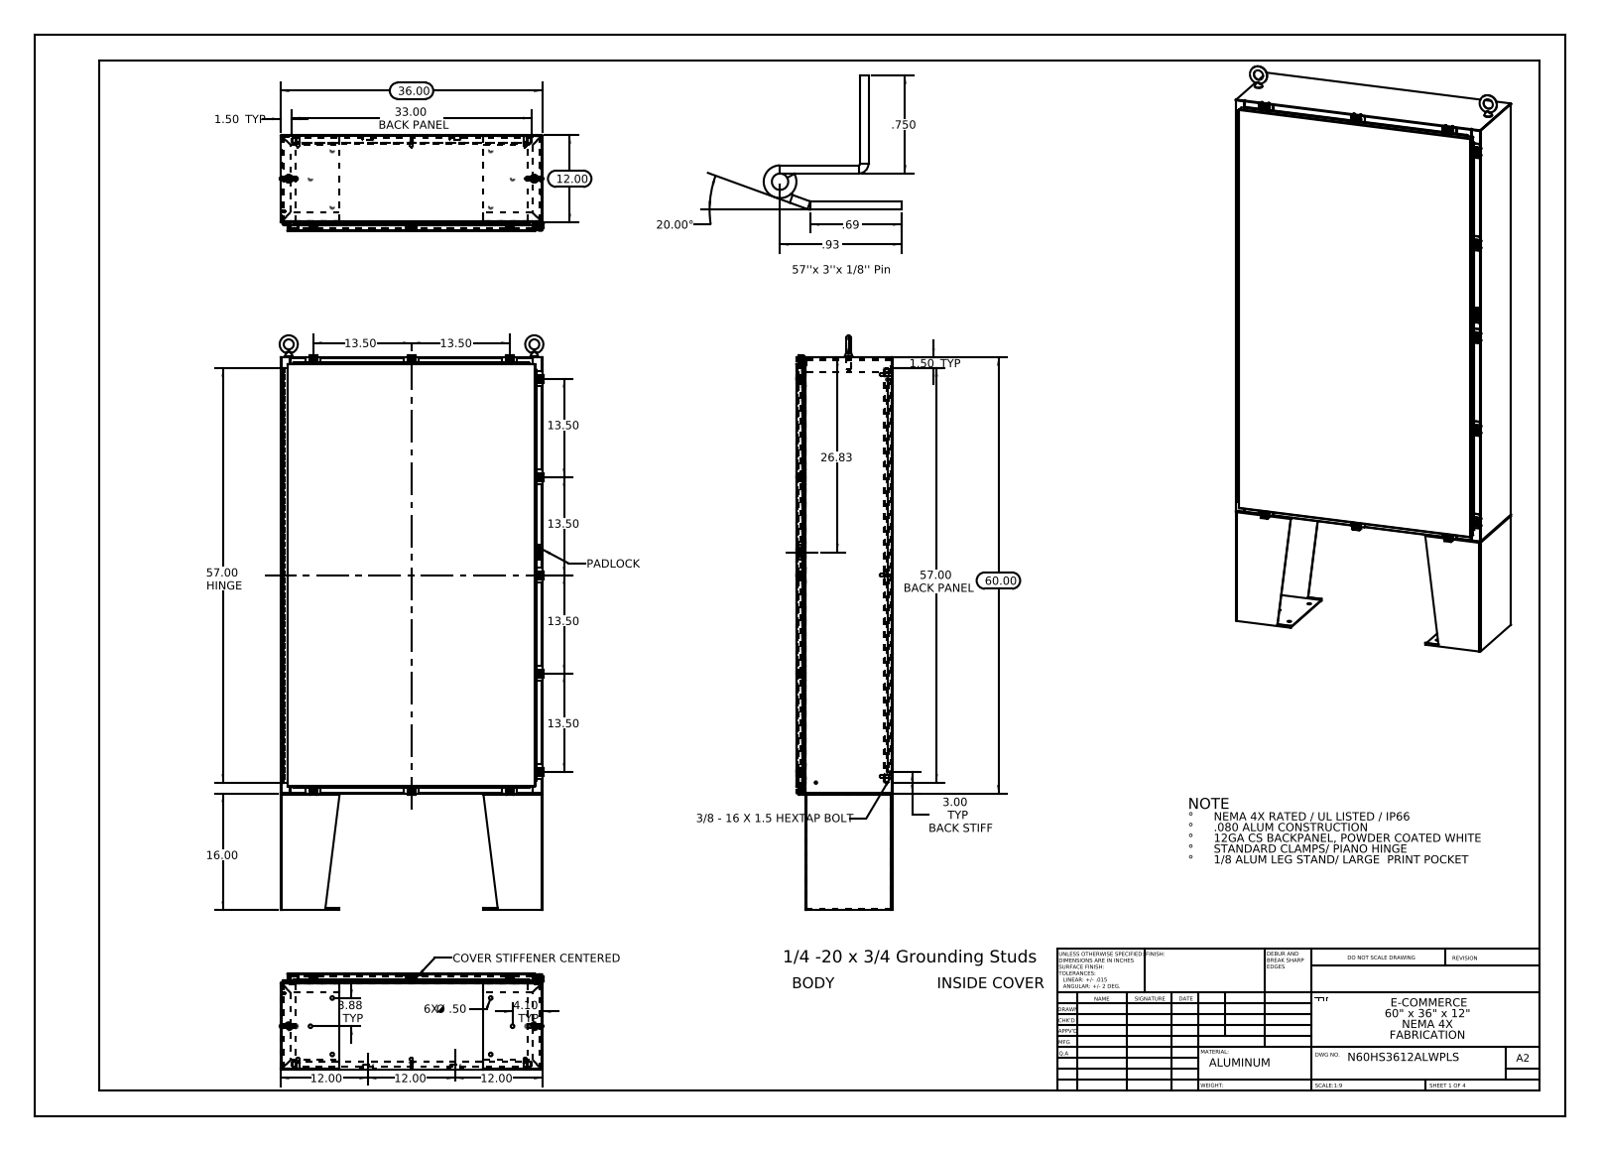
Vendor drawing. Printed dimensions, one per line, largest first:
60.00
57.00 HINGE
57.00 BACK PANEL
36.00
33.00 BACK PANEL
26.83
20.00°
16.00
13.50
13.50
13.50
13.50
13.50
13.50
12.00
12.00
12.00
12.00
4.10 TYP
3.88 TYP
3.00 TYP BACK STIFF
1.50 TYP
1.50 TYP
.93
.750
.69
6X Ø .50
